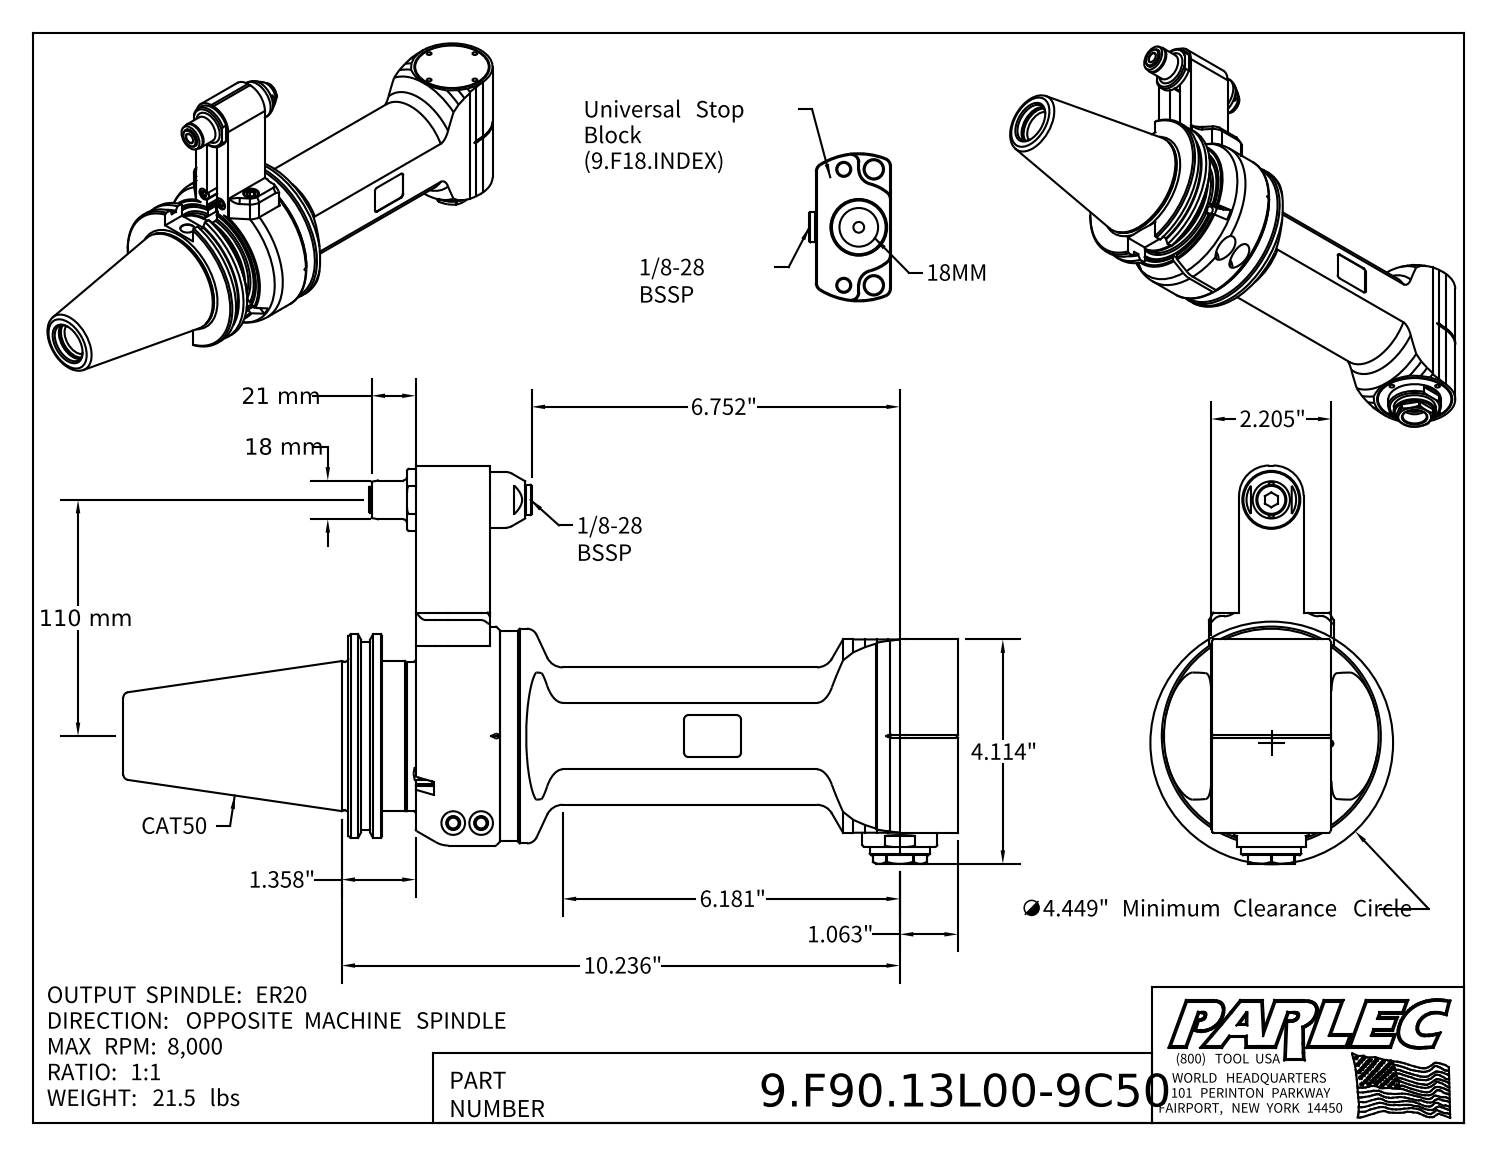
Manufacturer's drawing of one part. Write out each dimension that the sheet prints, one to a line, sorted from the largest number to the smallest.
110 mm
21 mm
18 mm
10.236"
6.752"
6.181"
∅4.449" Minimum Clearance Circle
4.114"
2.205"
1.358"
1.063"
